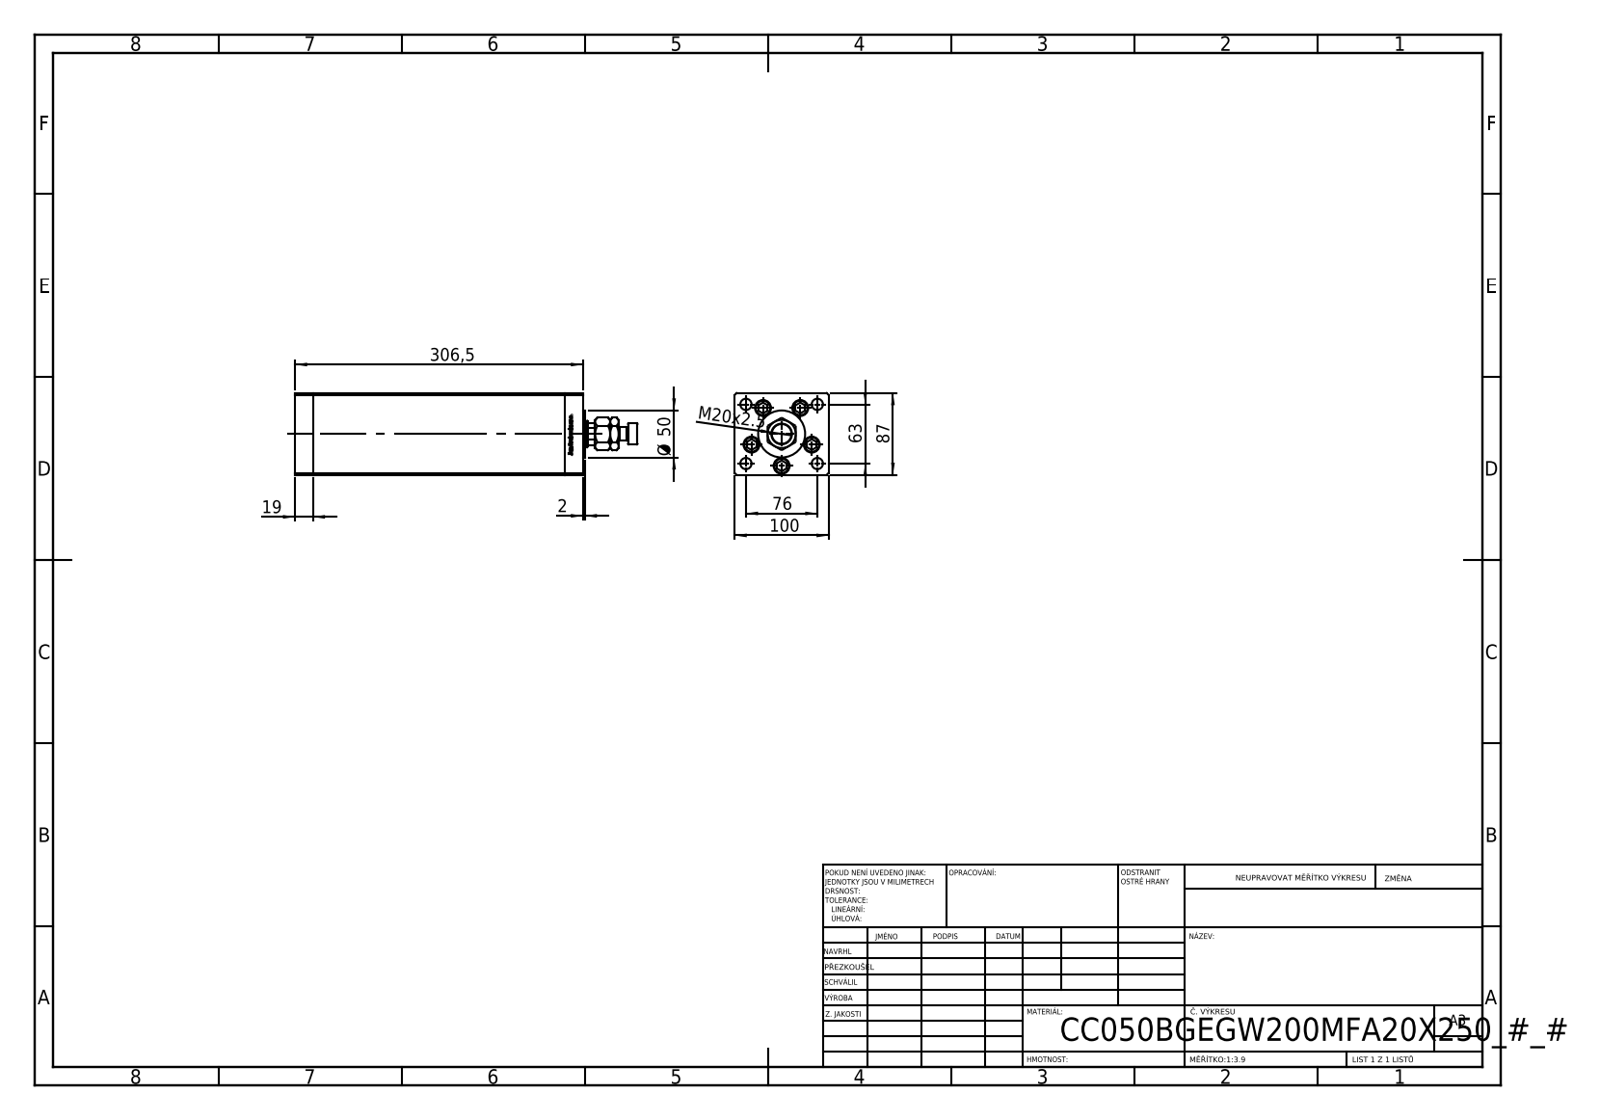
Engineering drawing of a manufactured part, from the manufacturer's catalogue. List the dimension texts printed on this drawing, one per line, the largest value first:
306,5
100
87
76
63
Ø 50
M20x2.5
19
2
